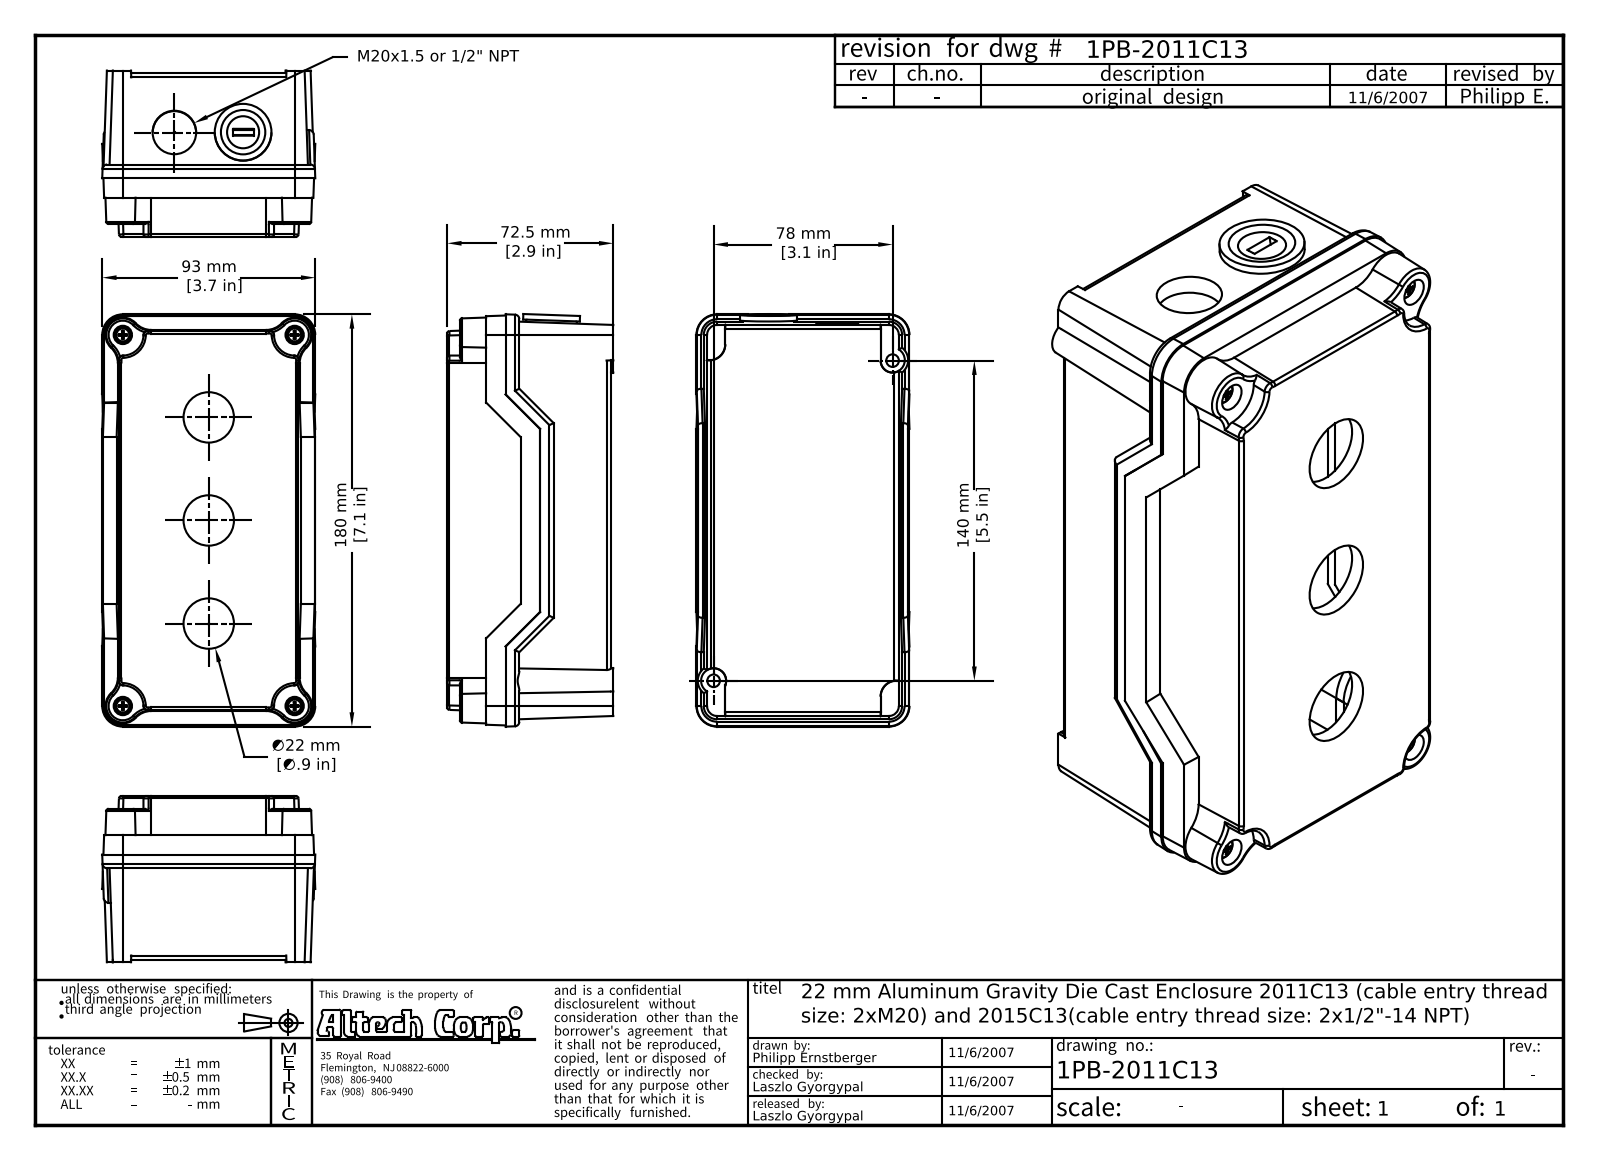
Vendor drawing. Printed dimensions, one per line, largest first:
180 mm [7.1 in]
140 mm [5.5 in]
93 mm [3.7 in]
78 mm [3.1 in]
72.5 mm [2.9 in]
∅22 mm [∅.9 in]
M20x1.5 or 1/2" NPT
